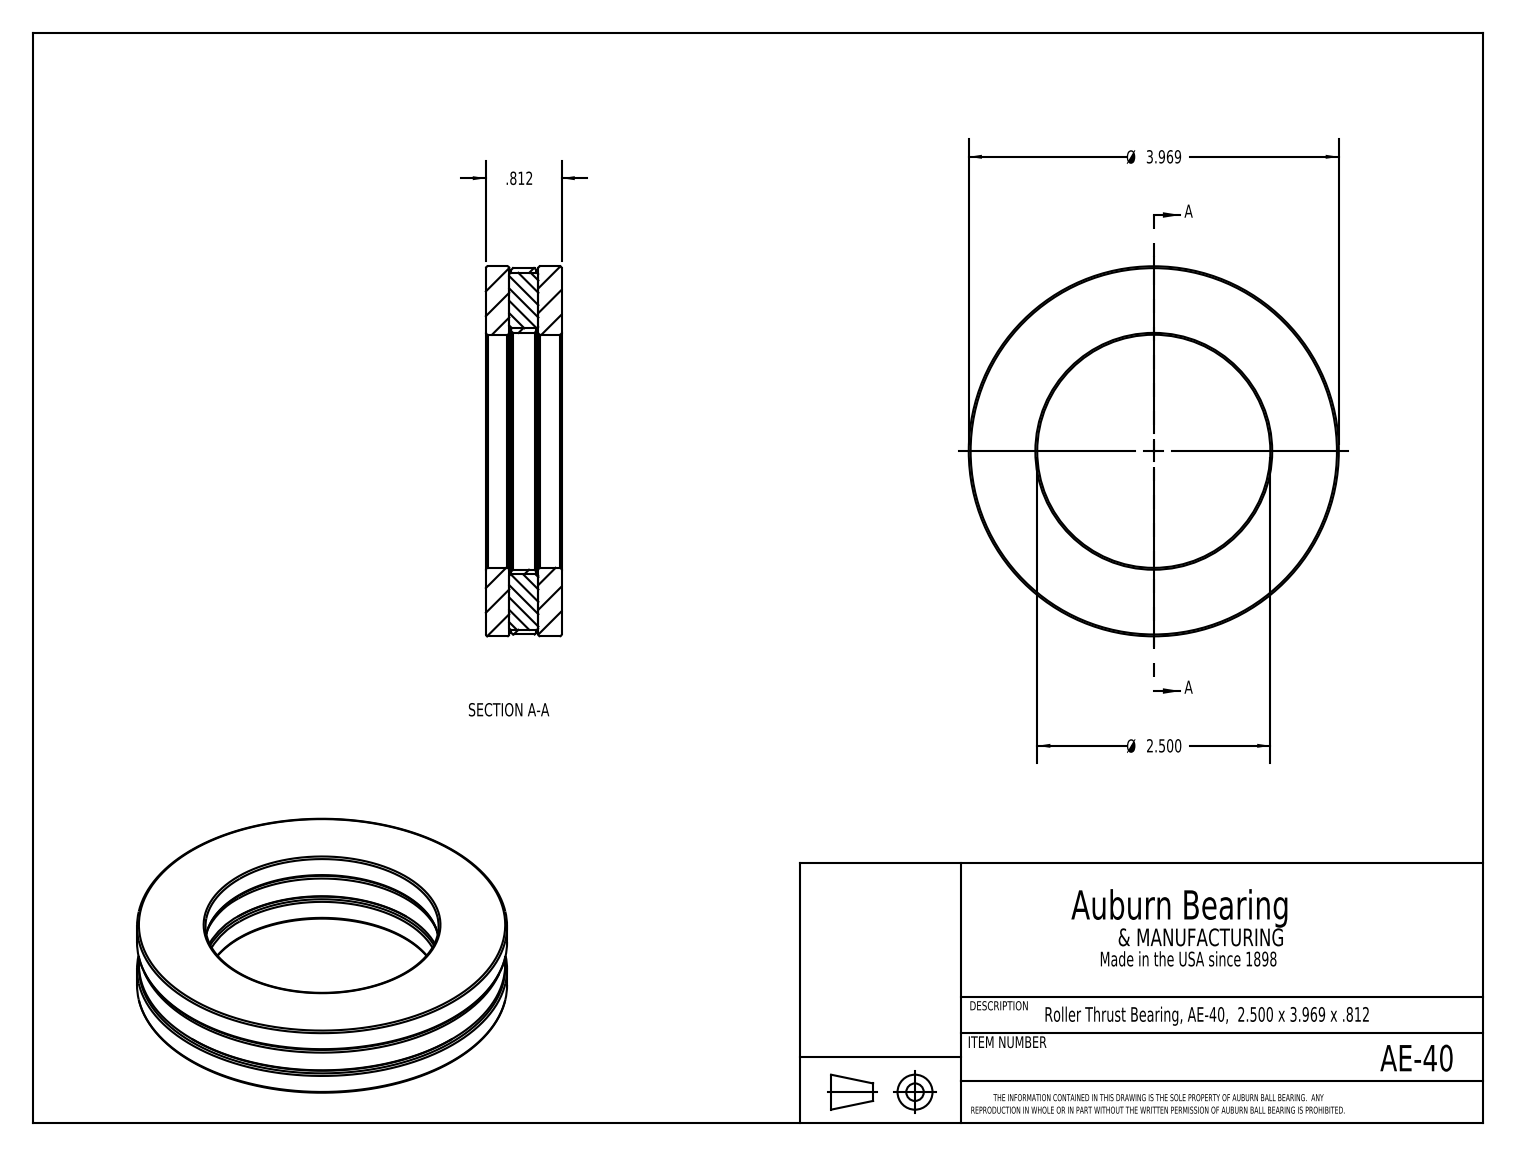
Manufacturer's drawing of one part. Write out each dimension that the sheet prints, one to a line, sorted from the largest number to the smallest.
Ø 3.969
Ø 2.500
.812
